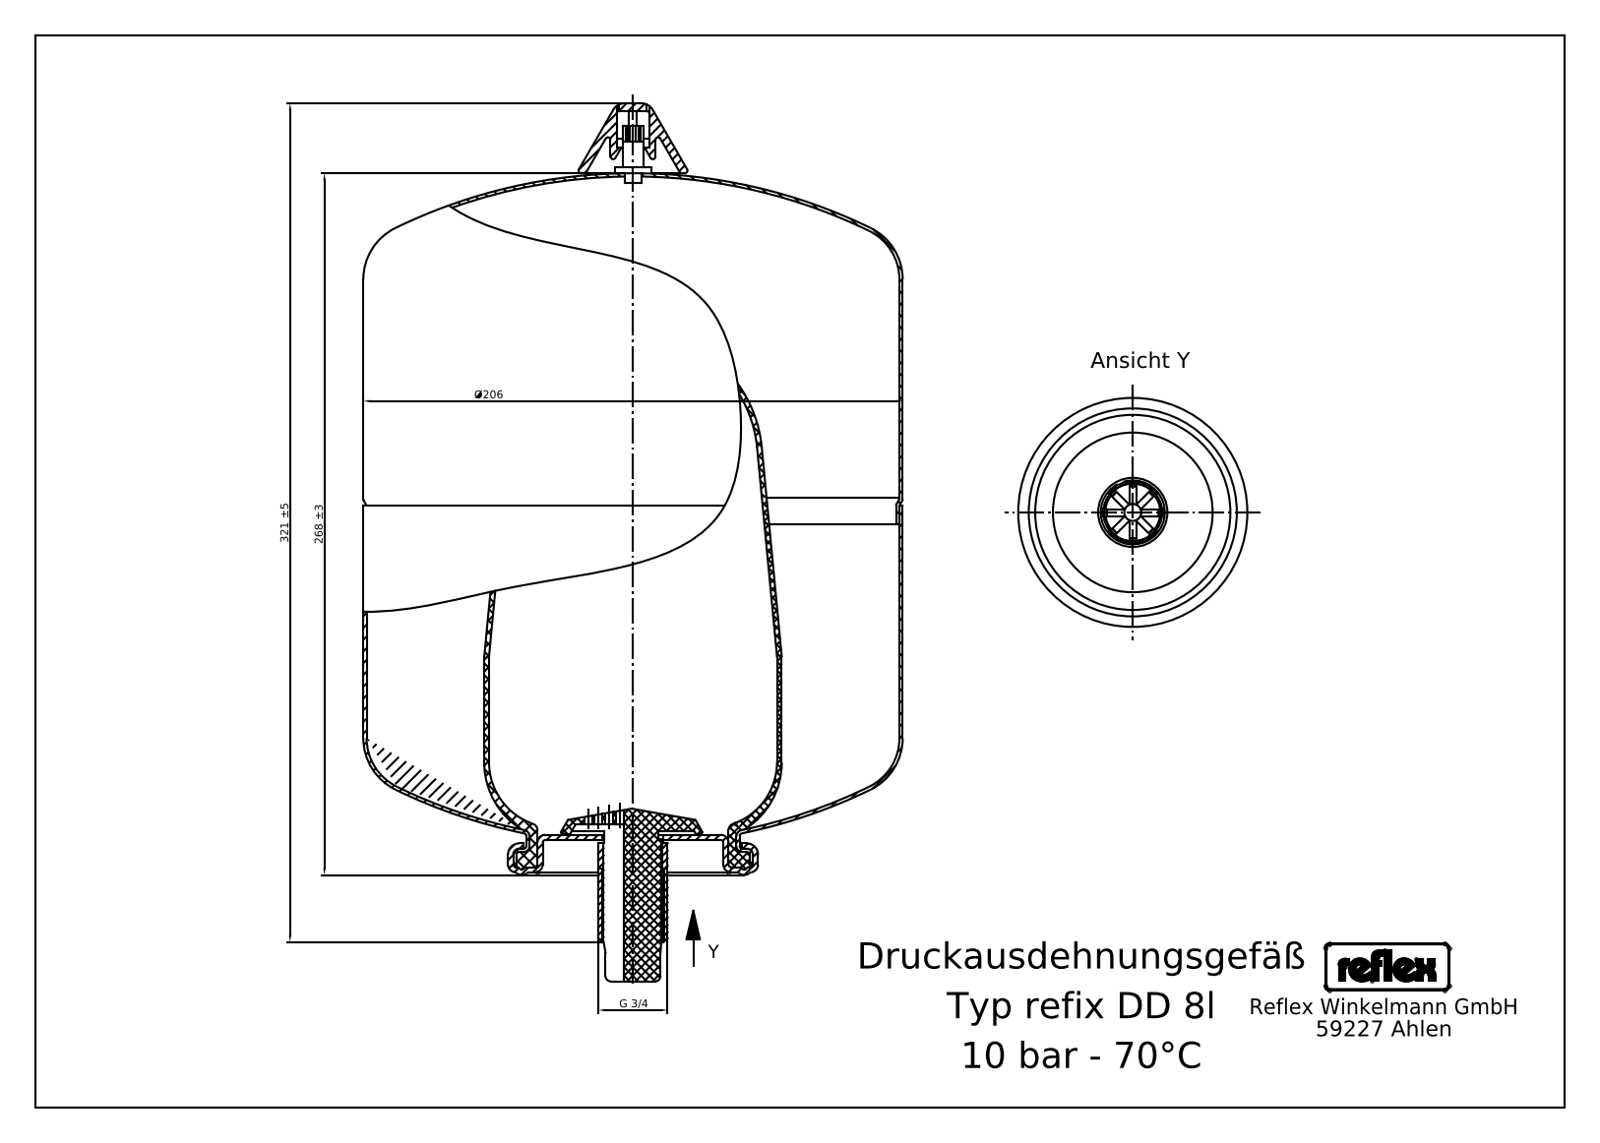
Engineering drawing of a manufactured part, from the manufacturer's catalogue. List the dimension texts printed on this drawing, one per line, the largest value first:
321 ±5
268 ±3
Ø206
G 3/4
